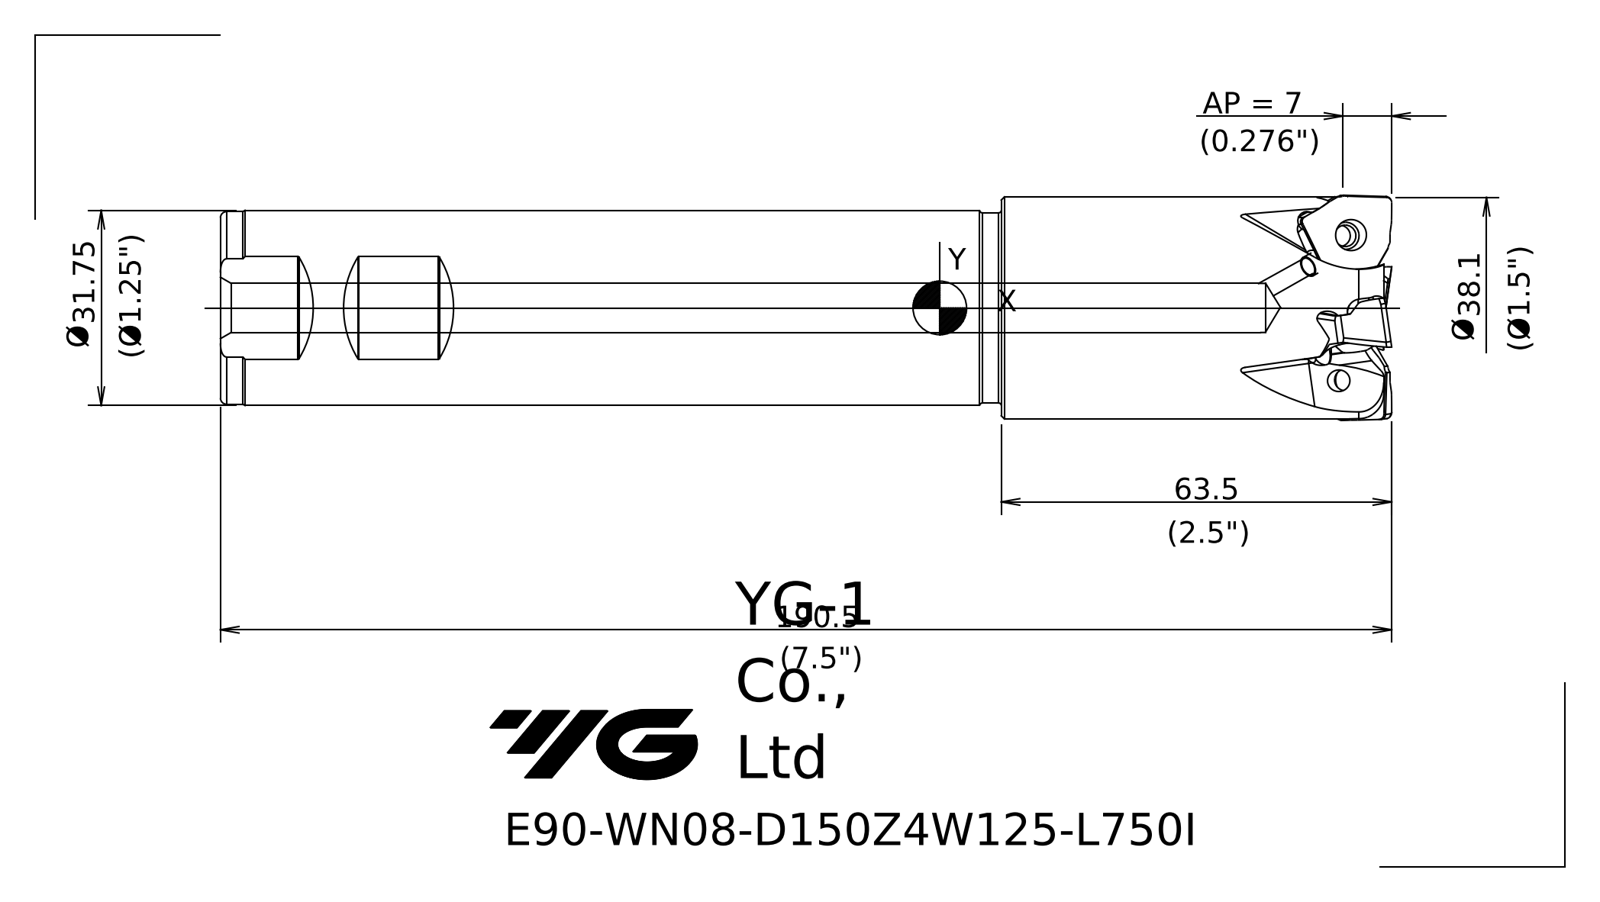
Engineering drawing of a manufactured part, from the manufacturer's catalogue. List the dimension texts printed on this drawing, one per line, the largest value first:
190.5
63.5
38.1 Ø
AP = 7
